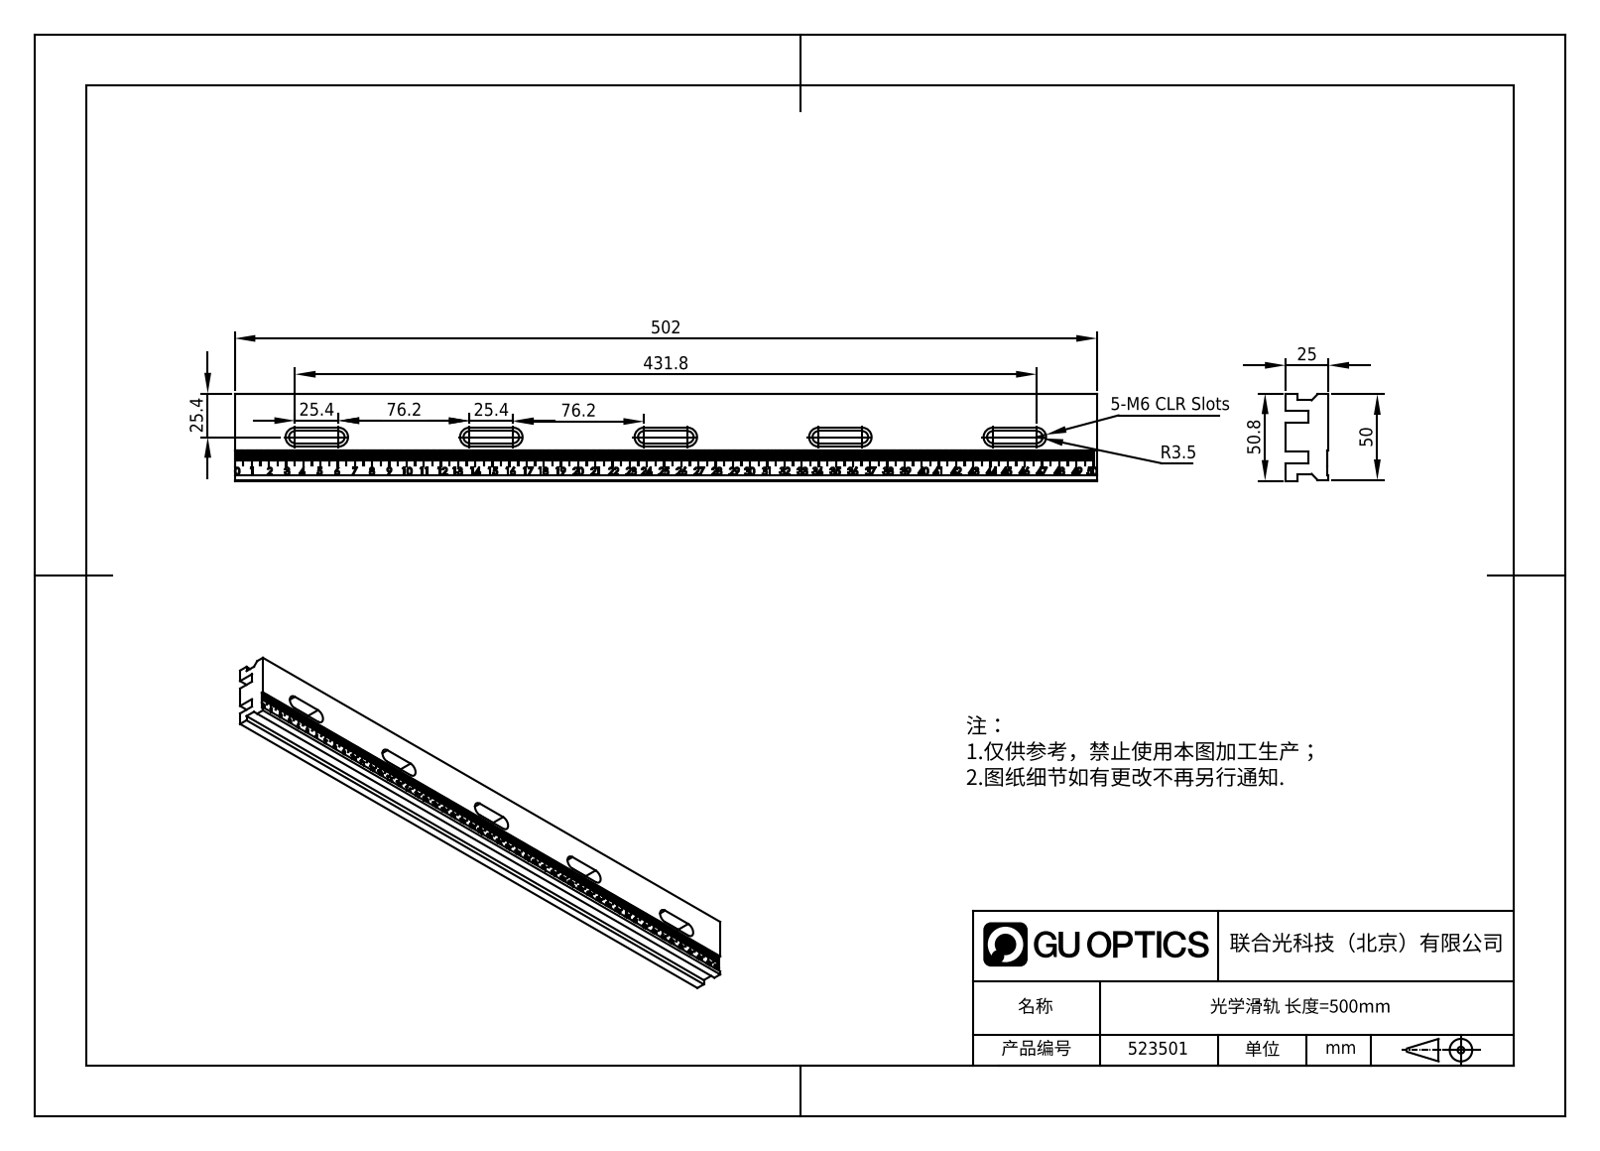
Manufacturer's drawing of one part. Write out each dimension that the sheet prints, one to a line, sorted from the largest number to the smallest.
502
431.8
76.2
76.2
50.8
50
25.4
25.4
25.4
25
5-M6 CLR Slots
R3.5
